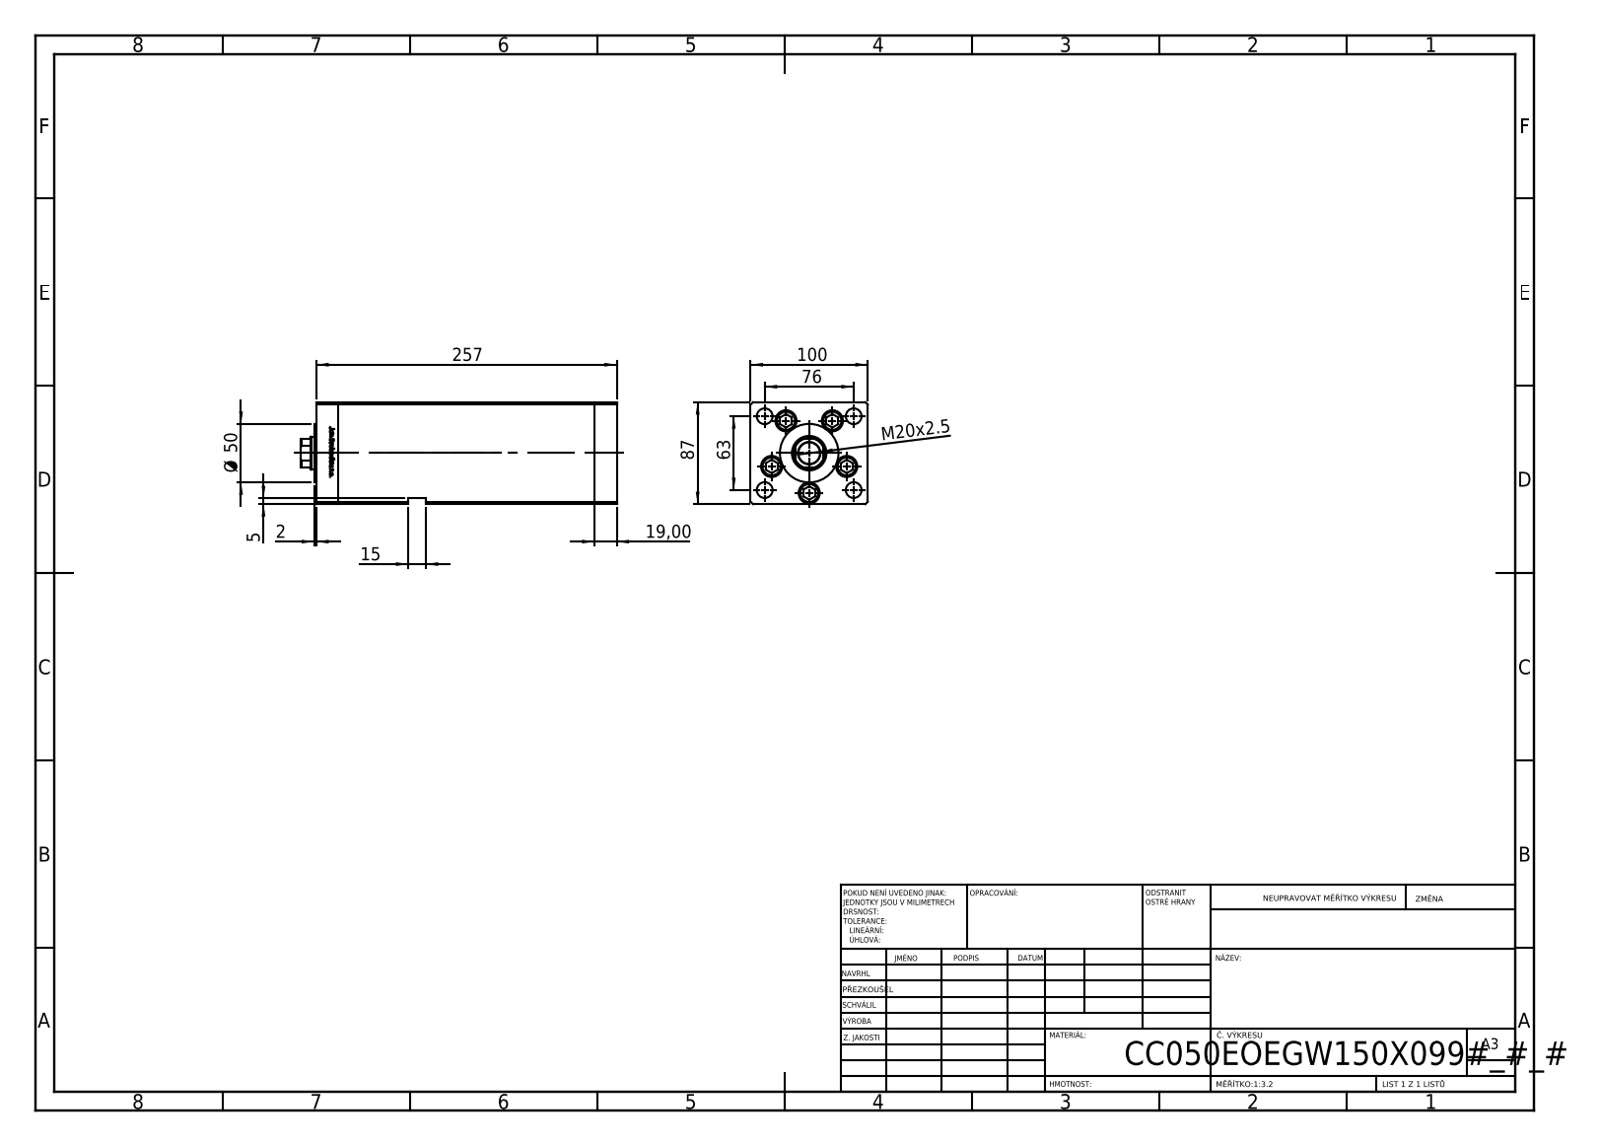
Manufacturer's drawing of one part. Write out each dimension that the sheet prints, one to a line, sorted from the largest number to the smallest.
257
100
87
76
63
Ø 50
M20x2.5
19,00
15
5
2
